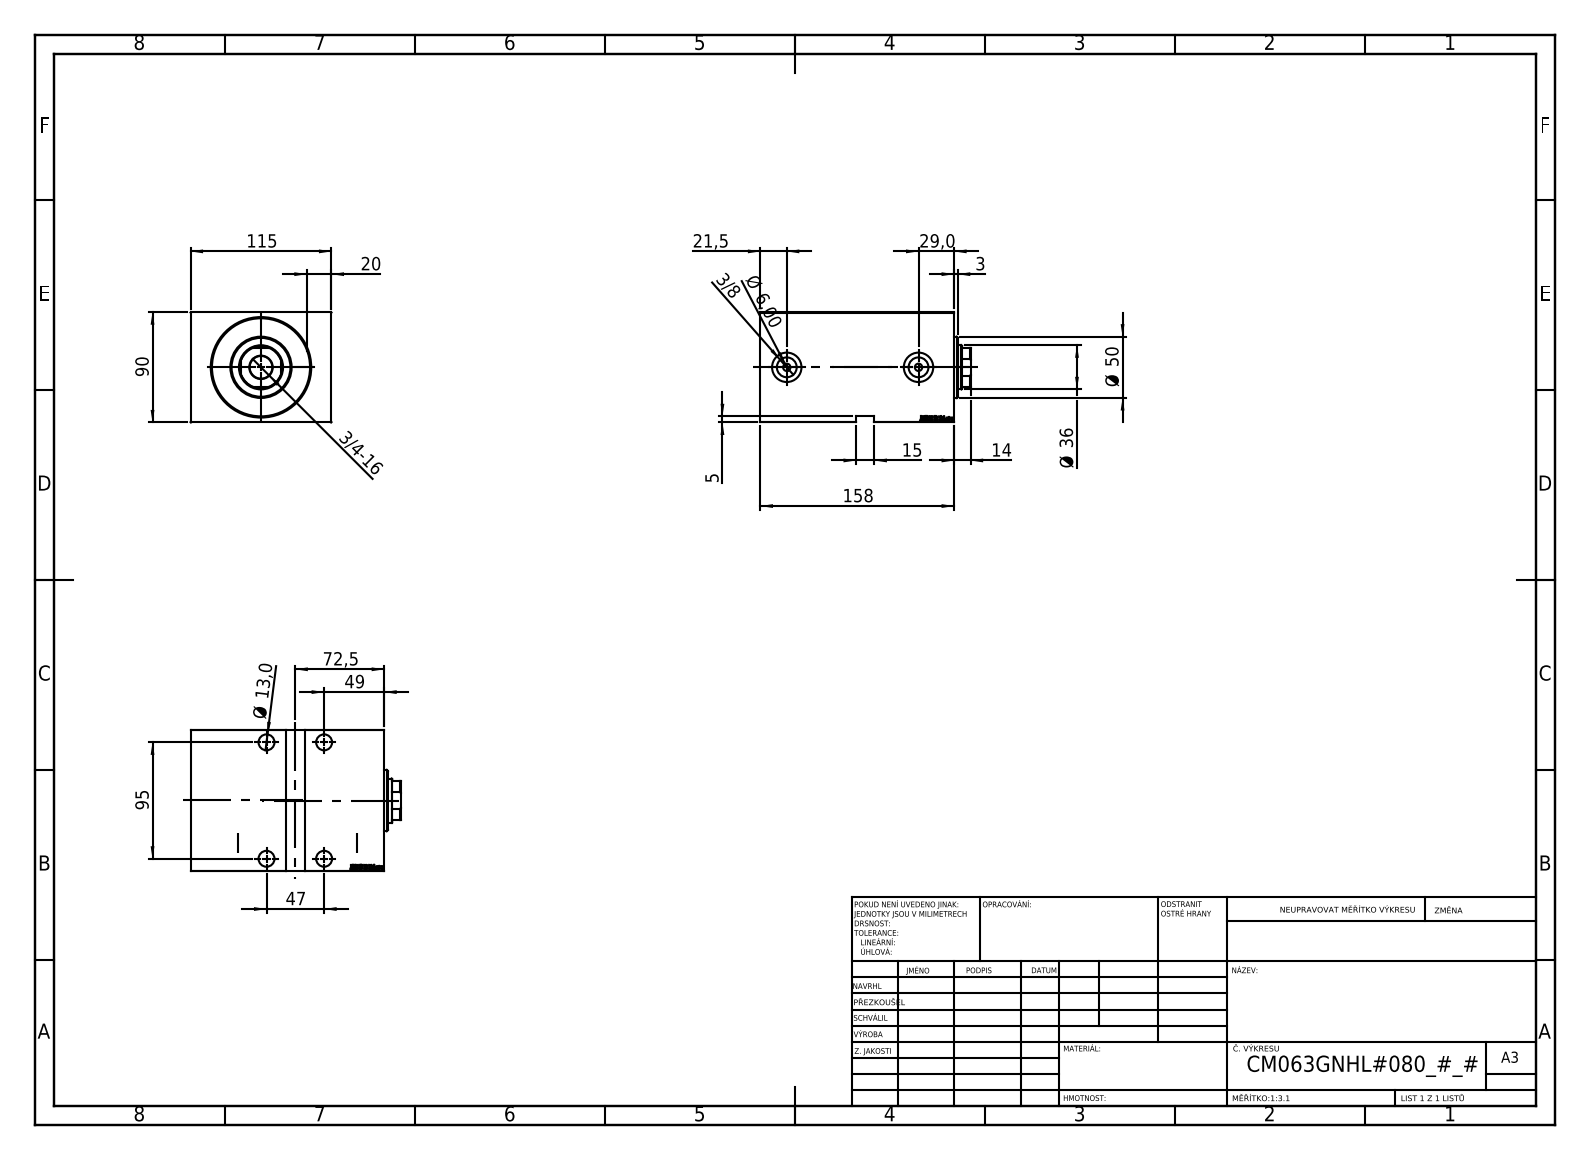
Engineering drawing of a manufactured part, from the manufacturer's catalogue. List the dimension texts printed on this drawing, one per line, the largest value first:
158
115
95
90
72,5
Ø 50
49
47
Ø 36
29,0
21,5
20
15
14
Ø 13,0
Ø 6,00
5
3
3/4-16
3/8
